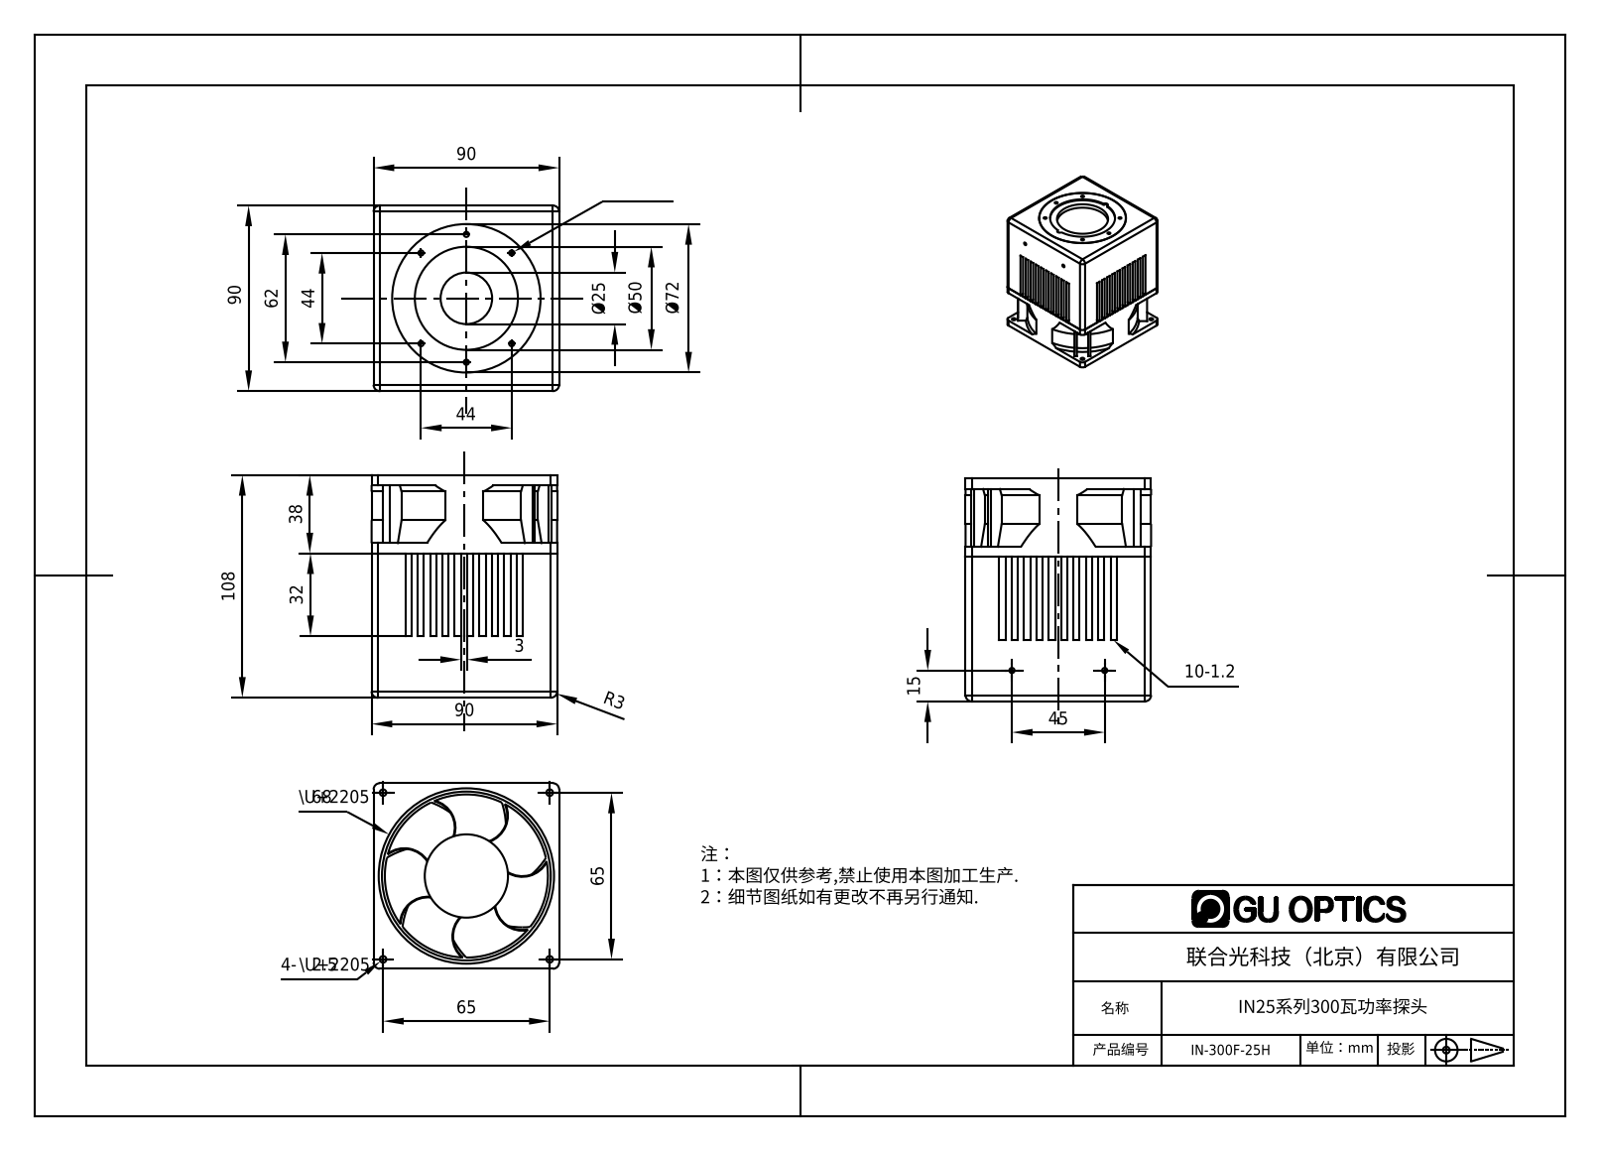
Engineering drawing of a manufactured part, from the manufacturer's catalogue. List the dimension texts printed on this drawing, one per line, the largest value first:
108
90
90
90
Ø72
65
65
62
Ø50
45
44
44
38
32
Ø25
15
3
R3
